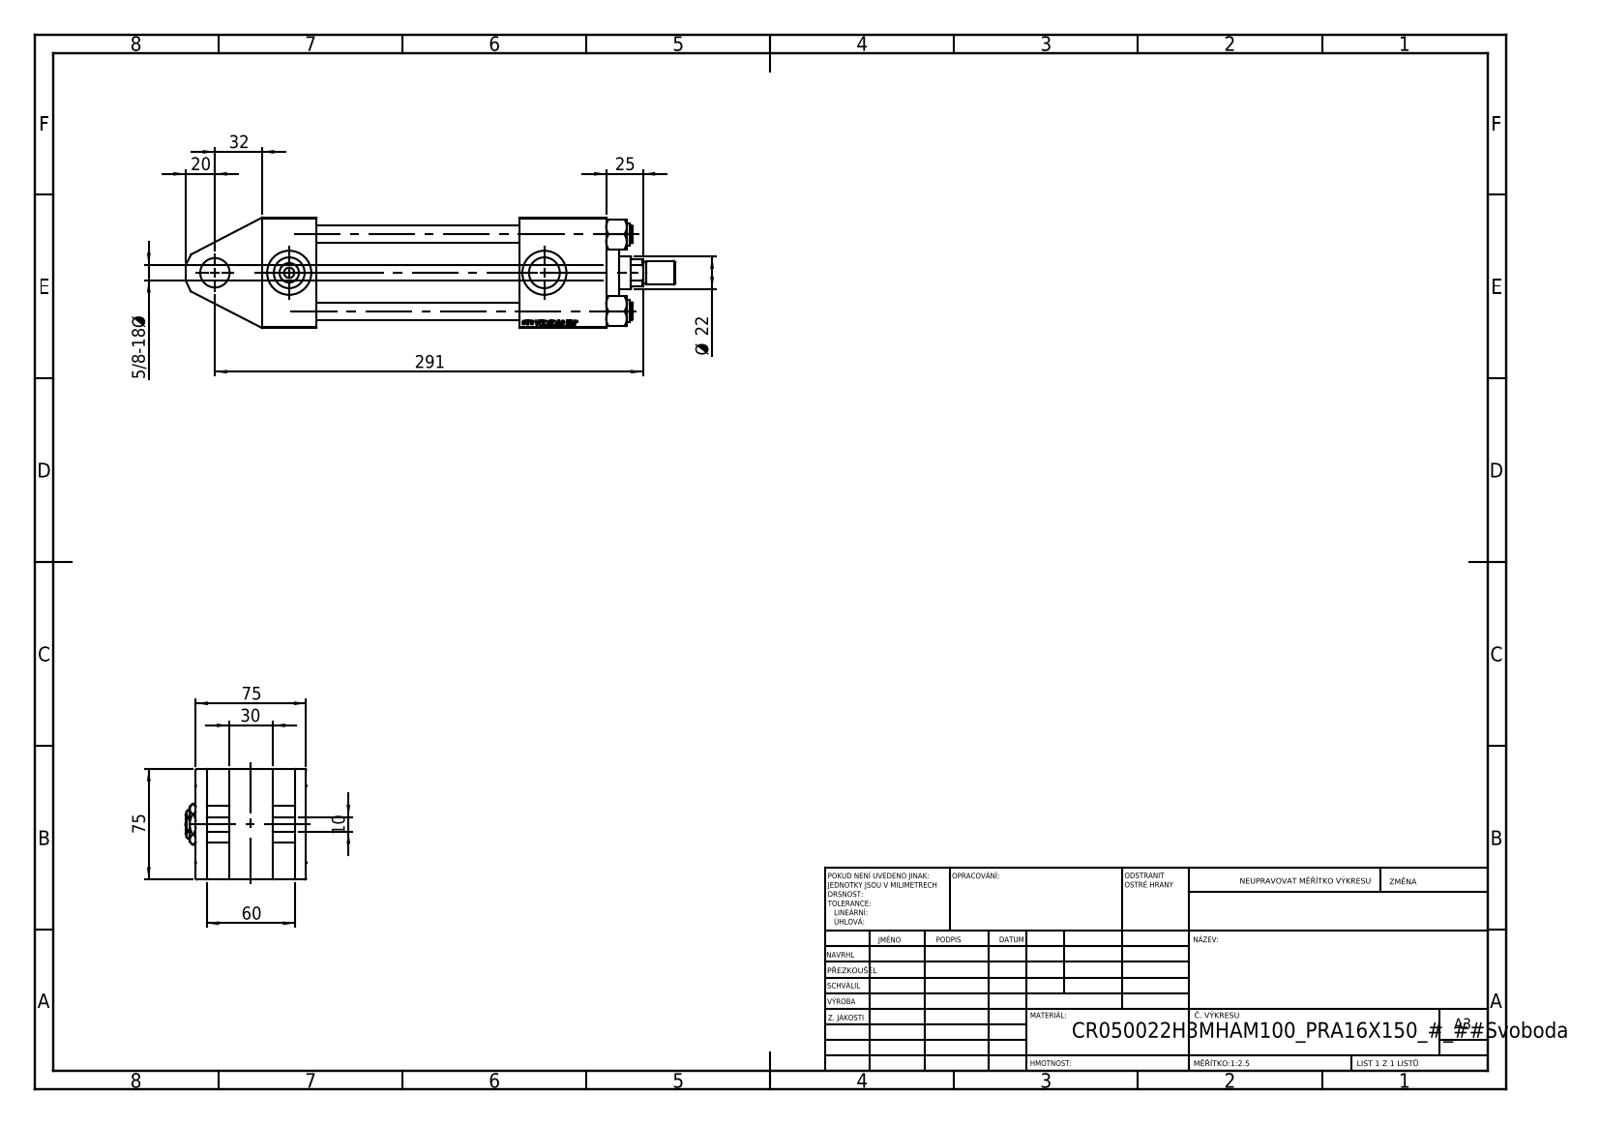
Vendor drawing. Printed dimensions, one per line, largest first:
291
75
75
60
32
30
25
Ø 22
20
10
5/8-18 Ø
